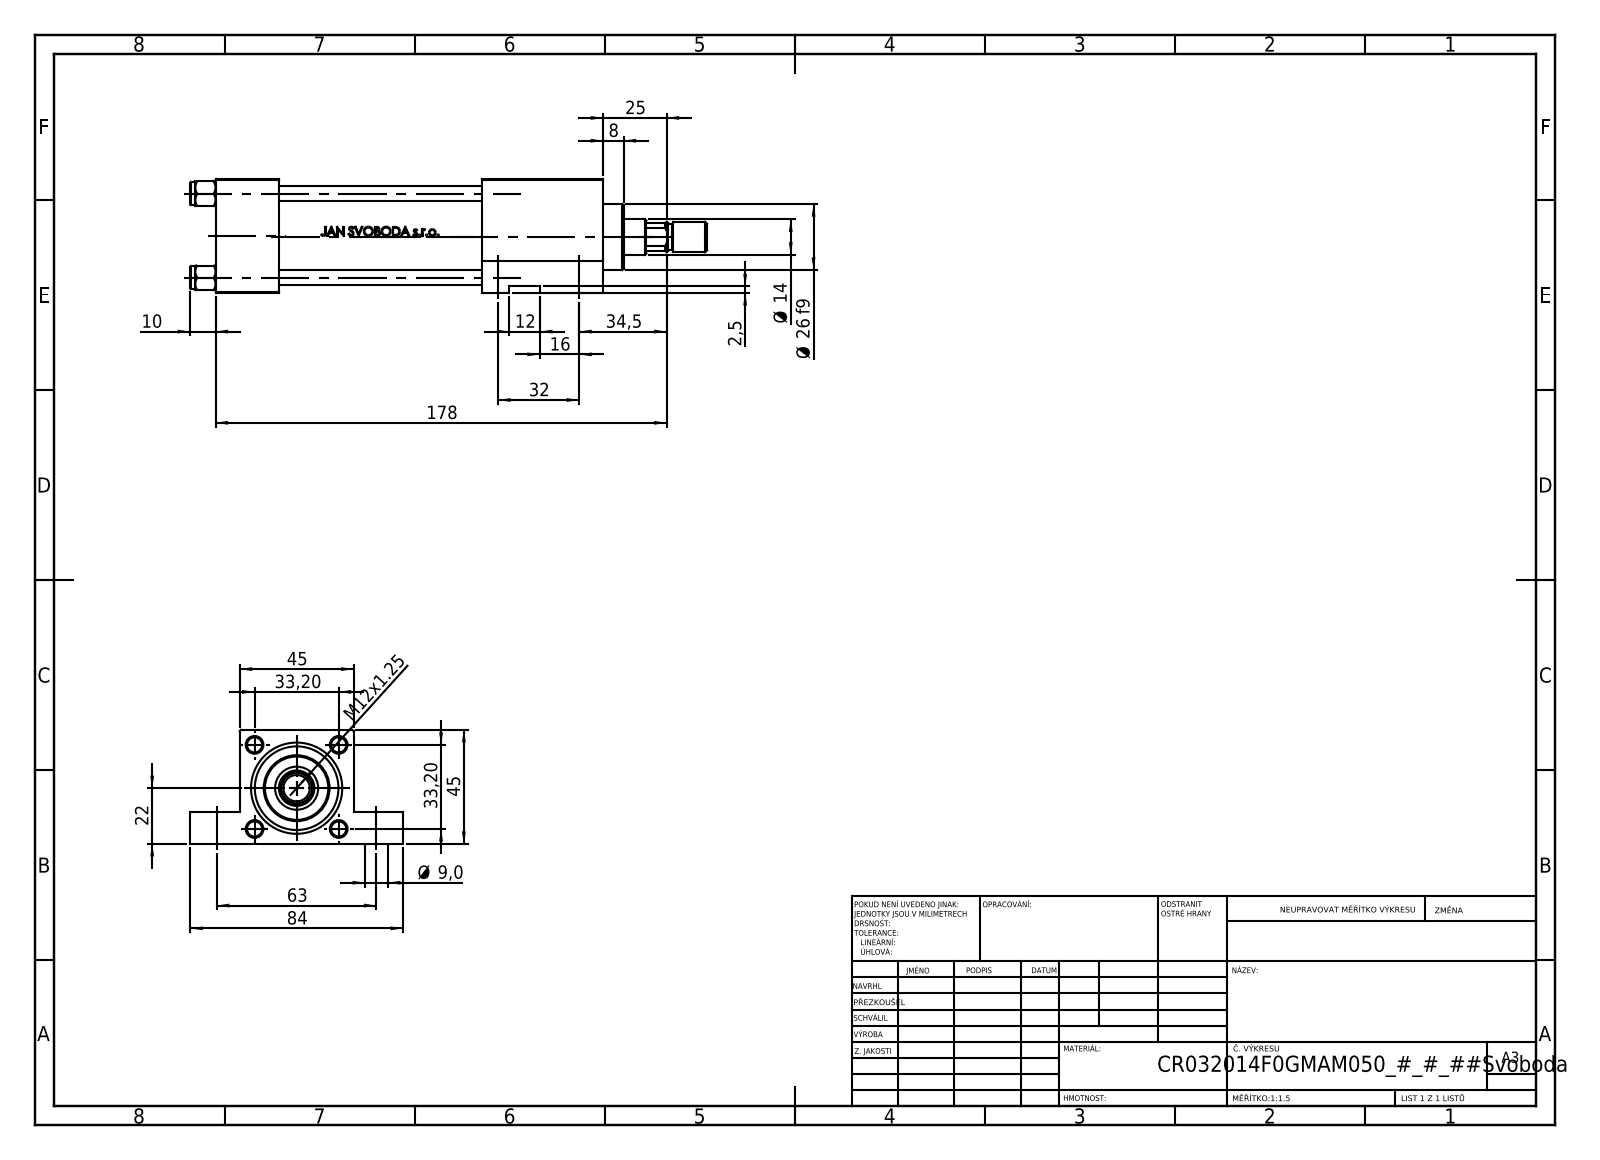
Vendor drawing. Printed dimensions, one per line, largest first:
178
84
63
45
45
34,5
33,20
33,20
32
Ø 26 f9
25
22
16
Ø 14
12
M12x1.25
10
Ø 9,0
8
2,5
